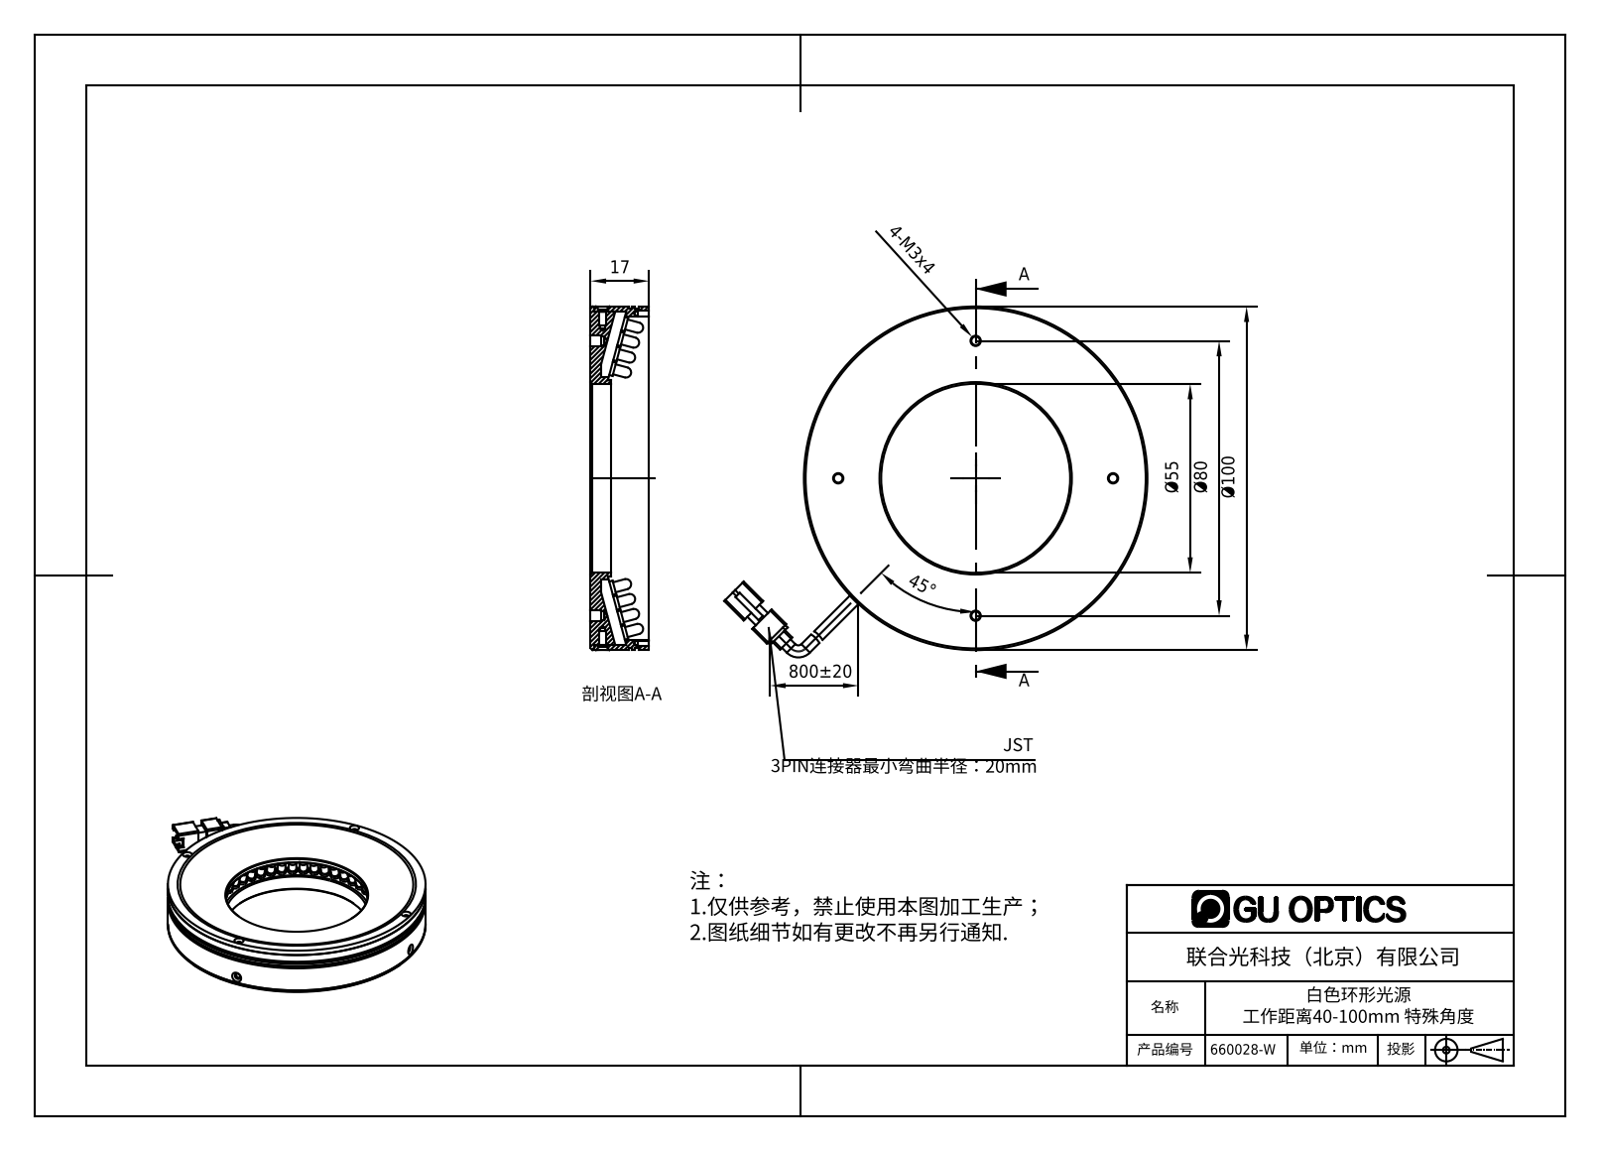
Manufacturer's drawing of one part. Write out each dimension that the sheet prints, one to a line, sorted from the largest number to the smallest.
800±20
Ø100
Ø80
Ø55
45°
17
4-M3x4
